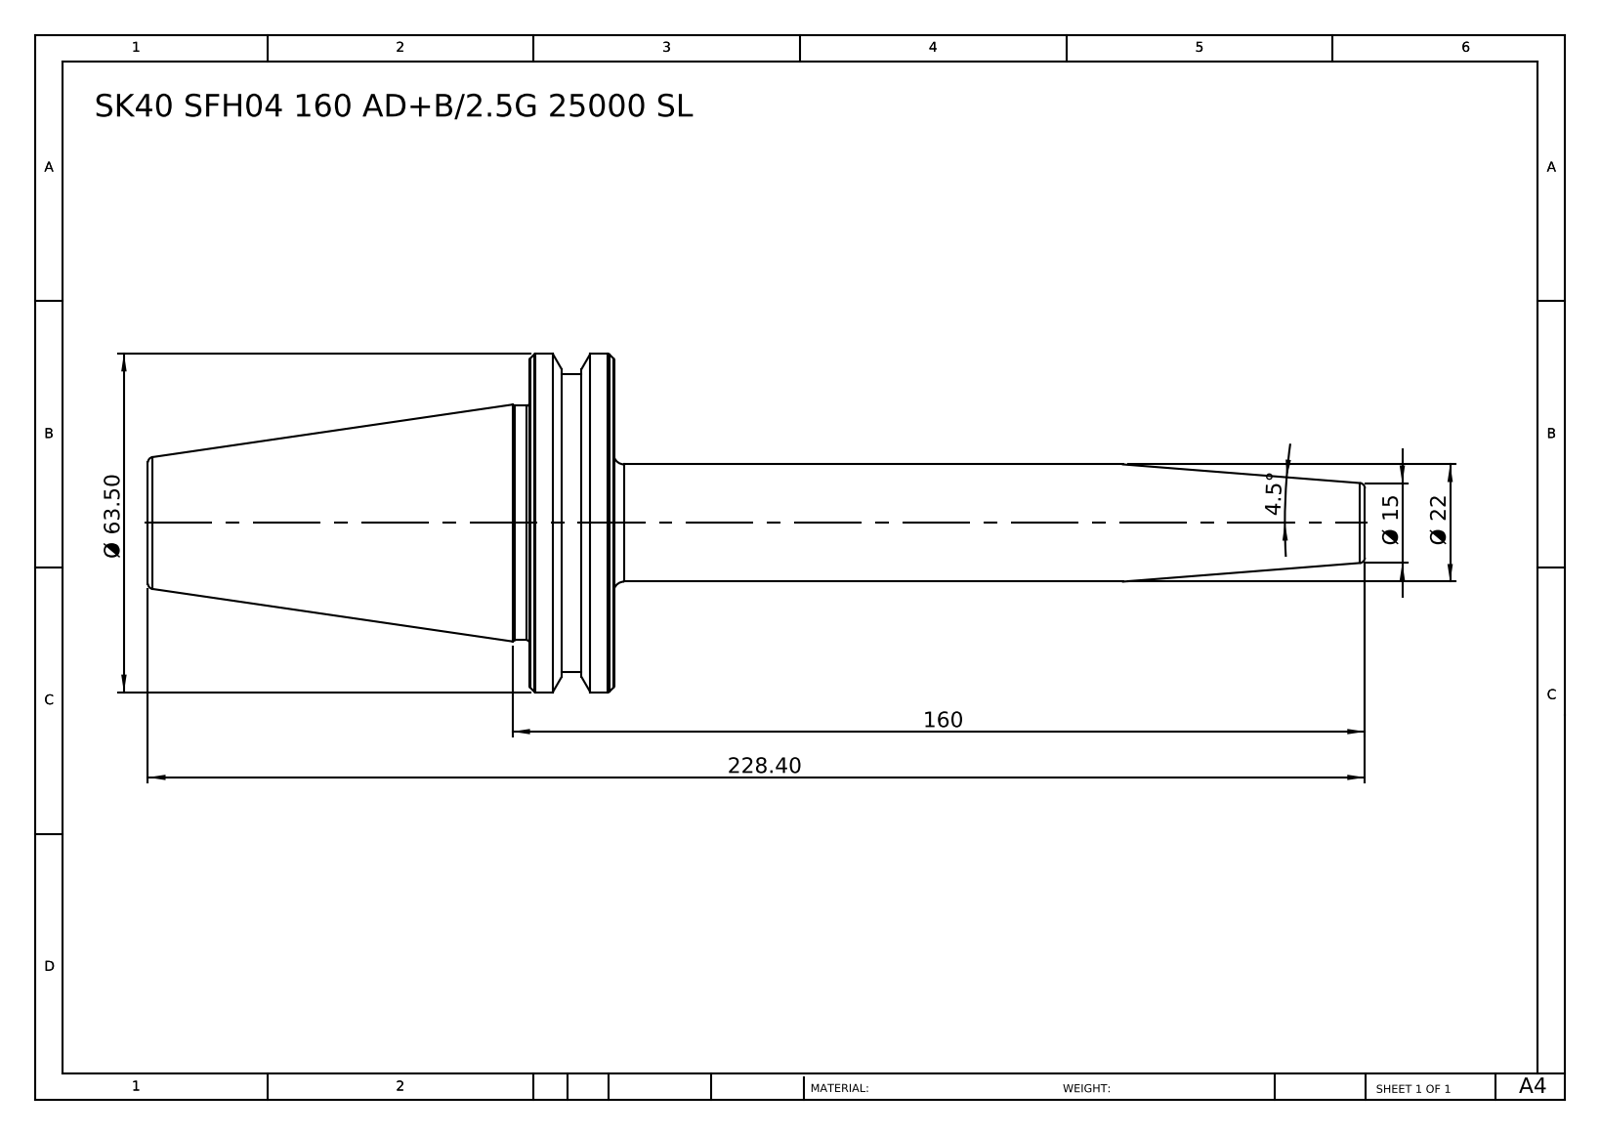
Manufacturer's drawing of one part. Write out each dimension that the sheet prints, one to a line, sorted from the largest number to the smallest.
228.40
160
Ø 63.50
Ø 22
Ø 15
4.5°
